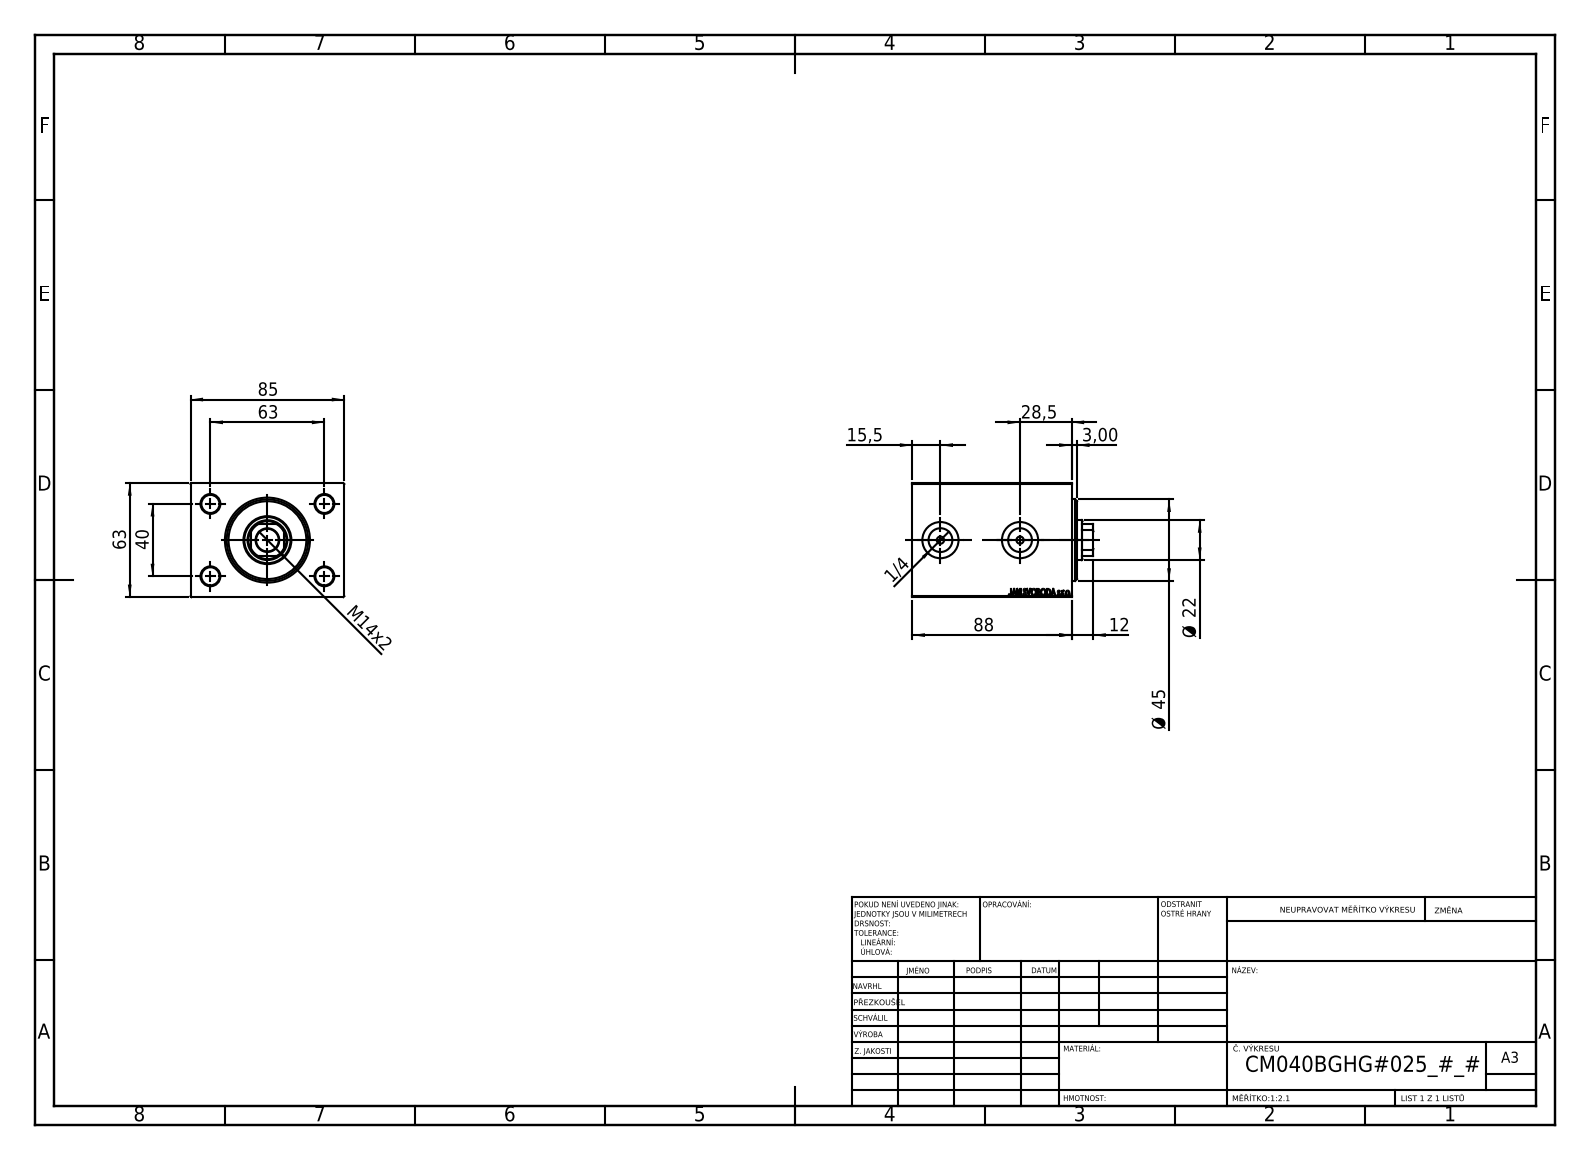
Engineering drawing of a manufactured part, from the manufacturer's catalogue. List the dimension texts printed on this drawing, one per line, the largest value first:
88
85
63
63
Ø 45
40
28,5
Ø 22
15,5
M14x2
12
3,00
1/4
